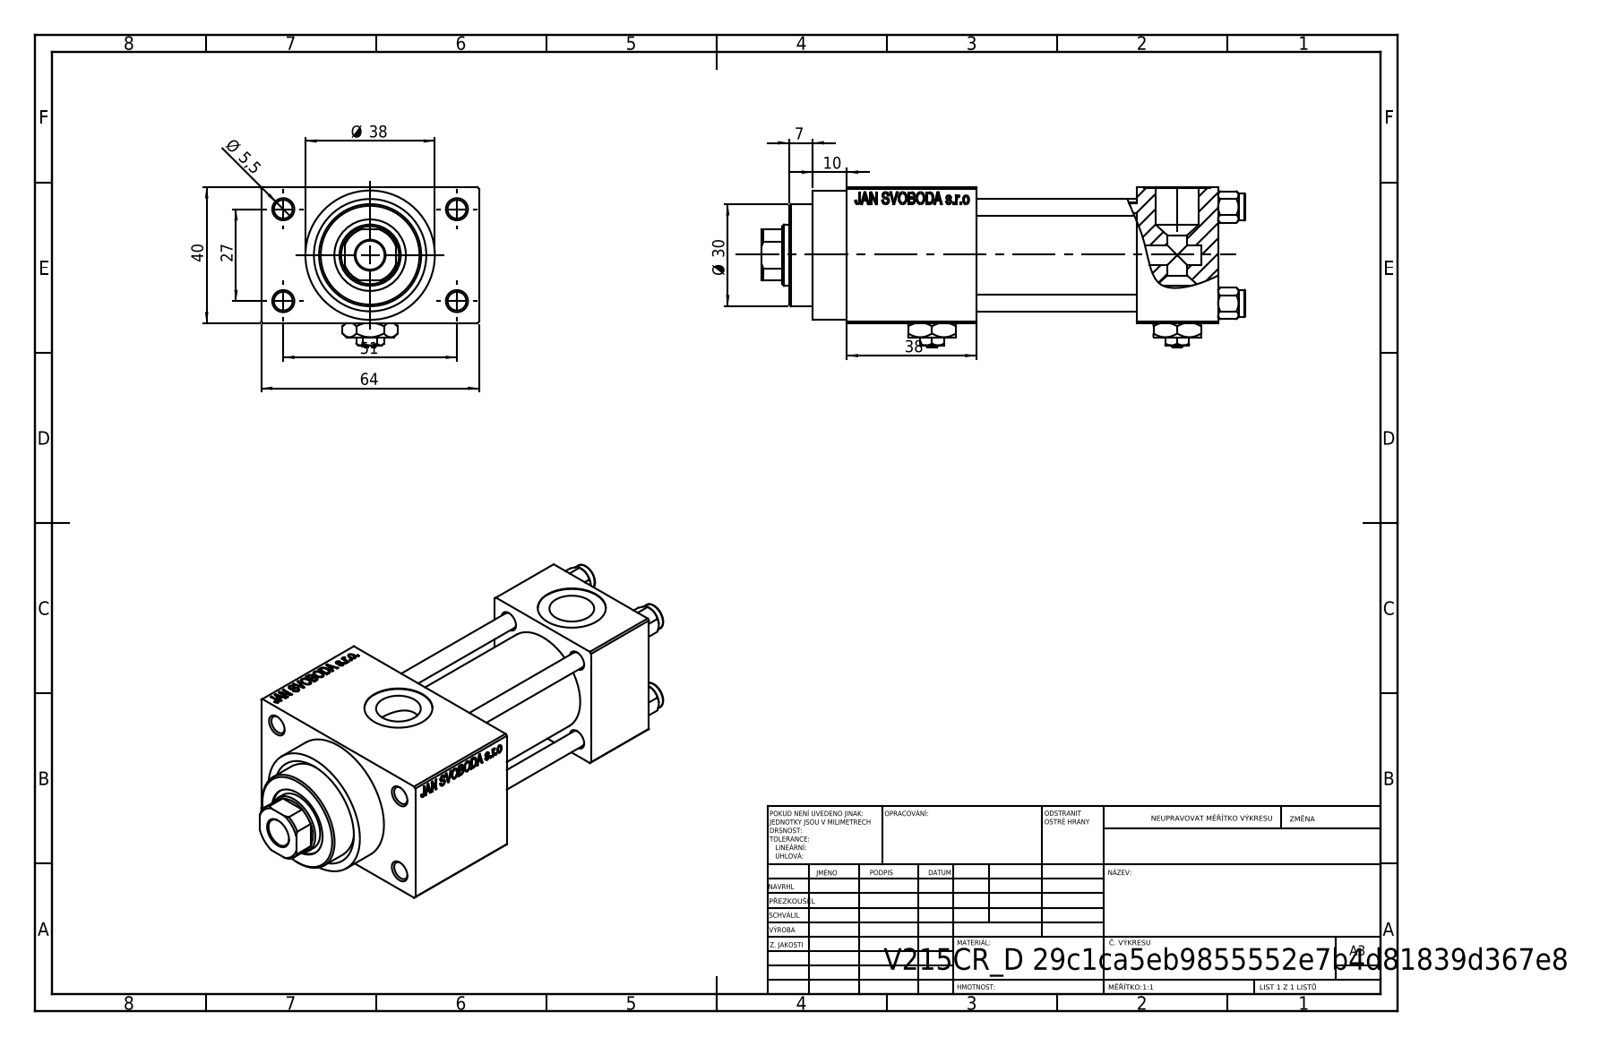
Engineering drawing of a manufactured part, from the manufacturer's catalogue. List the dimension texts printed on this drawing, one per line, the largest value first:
64
51
40
38
Ø 38
Ø 30
27
10
7
Ø 5,5
